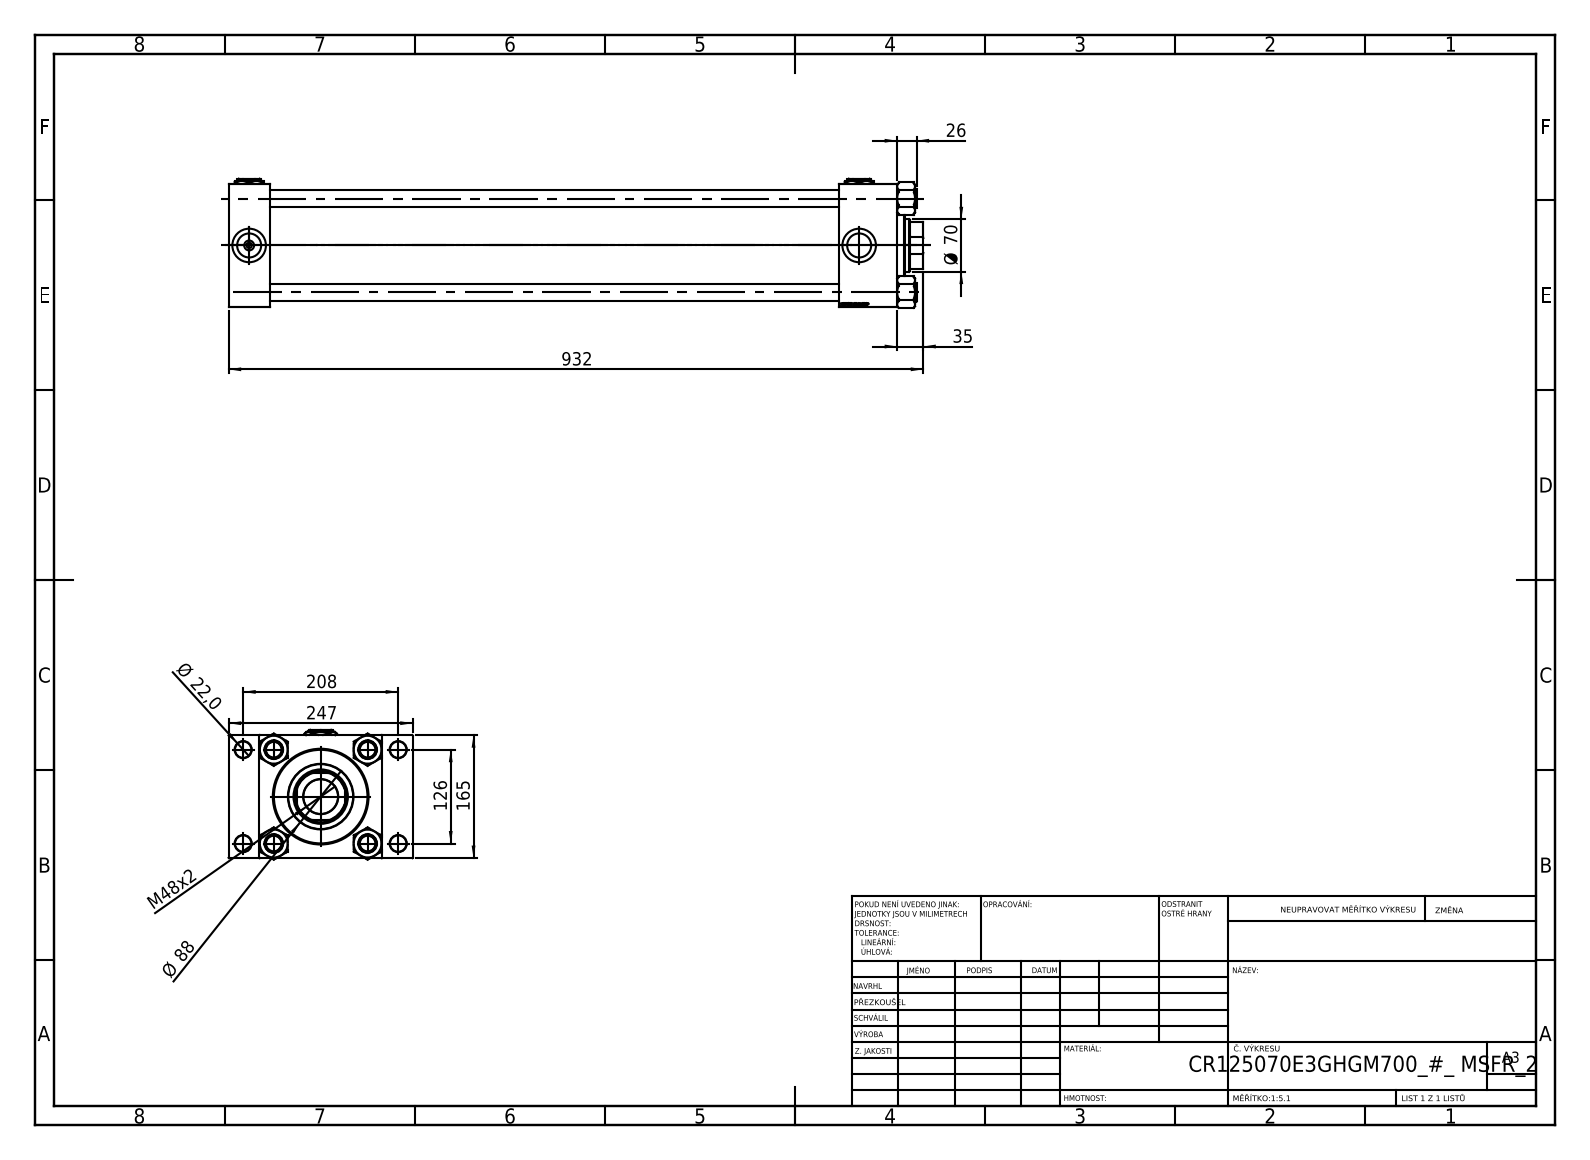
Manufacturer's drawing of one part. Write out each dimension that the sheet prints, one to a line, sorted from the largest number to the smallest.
932
247
208
165
126
Ø 88
Ø 70
M48x2
35
26
Ø 22,0
